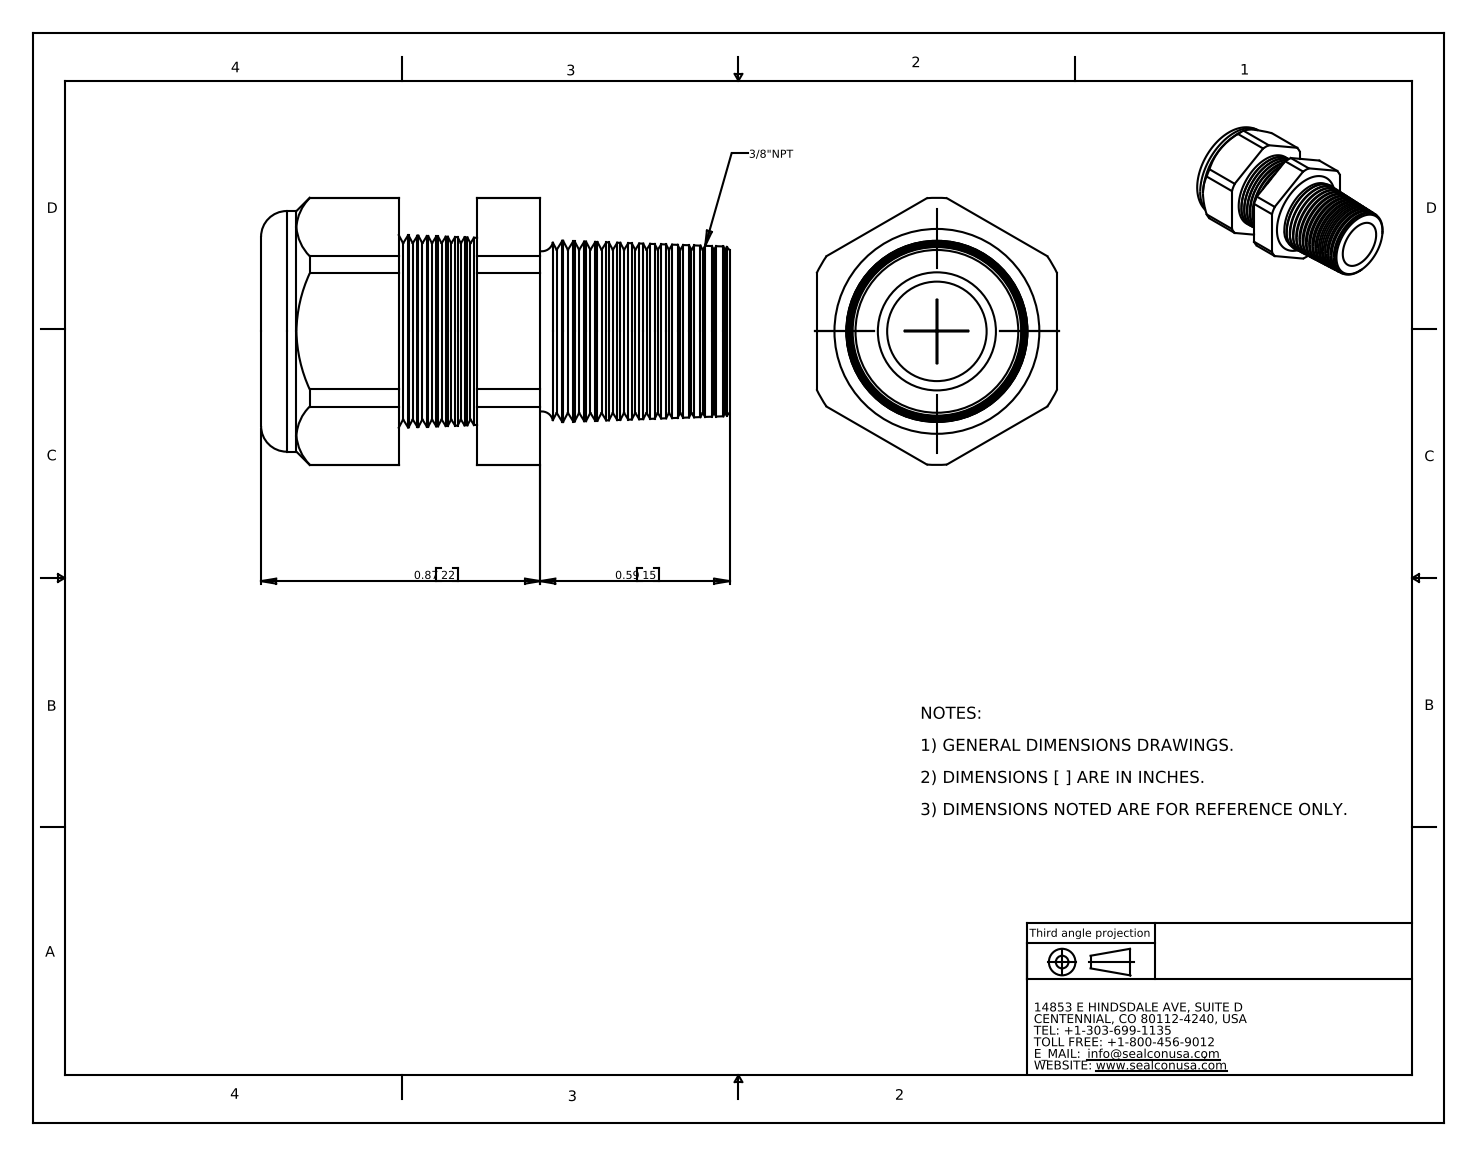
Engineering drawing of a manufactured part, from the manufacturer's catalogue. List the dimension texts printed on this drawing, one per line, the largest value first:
0.87 22
0.59 15
